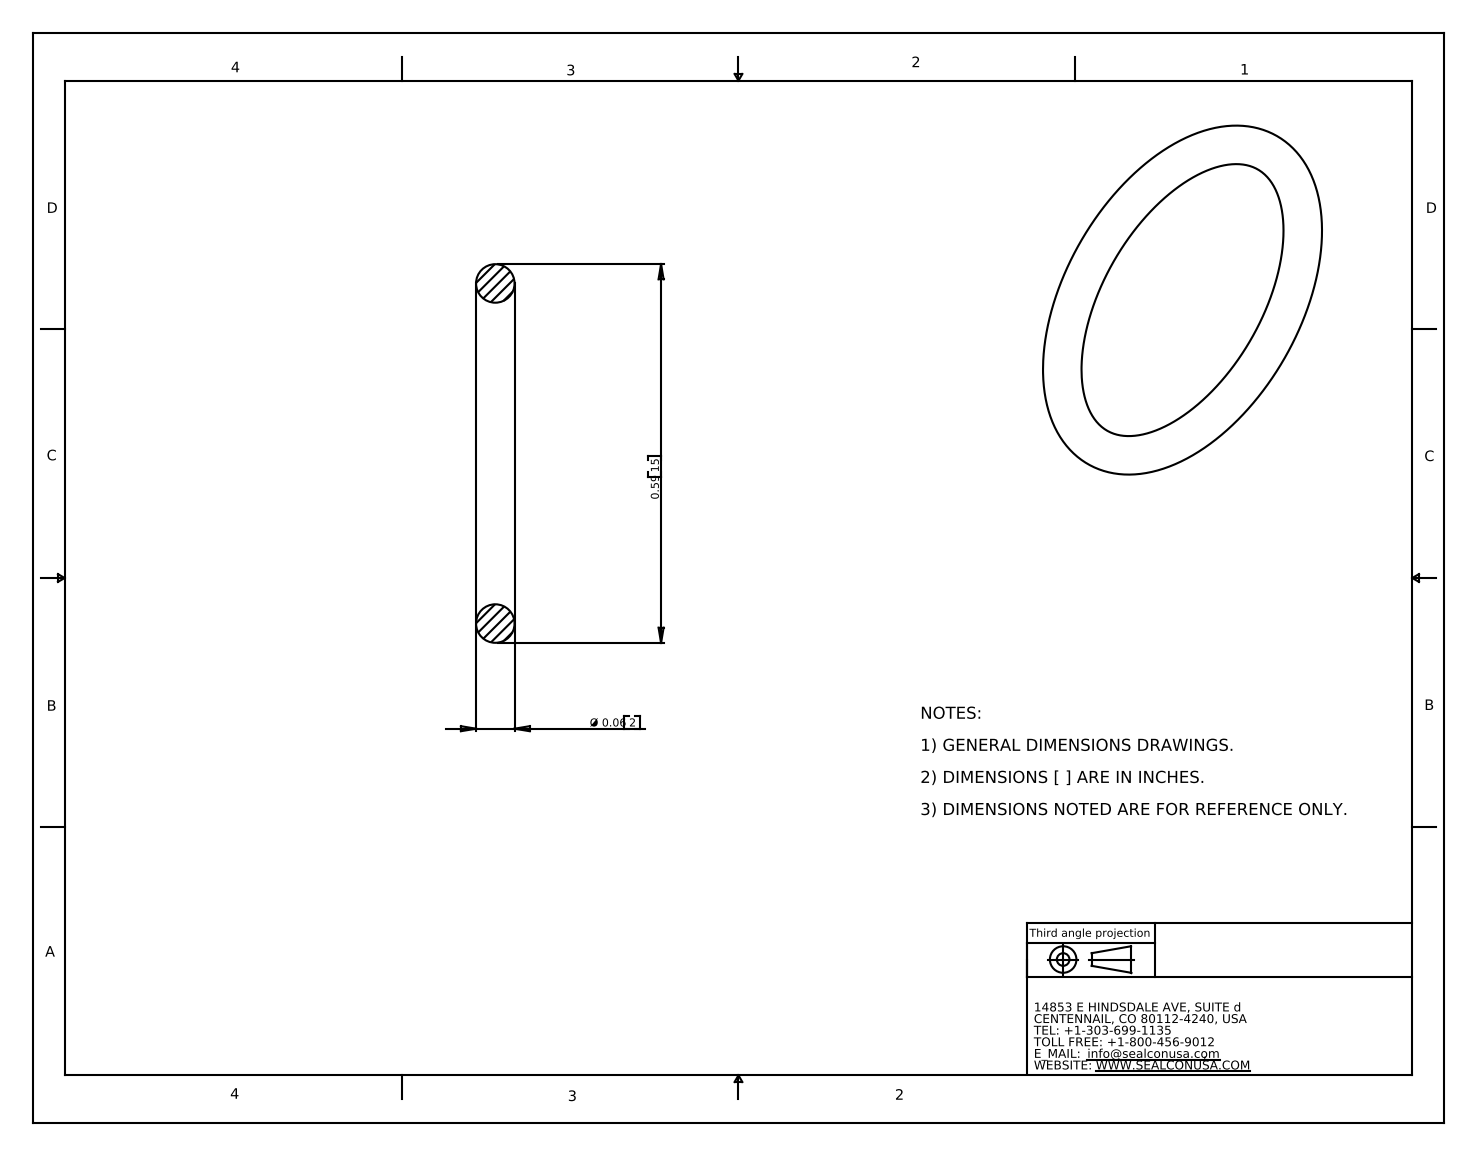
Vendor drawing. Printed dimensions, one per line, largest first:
0.59 15
Ø 0.06 2
